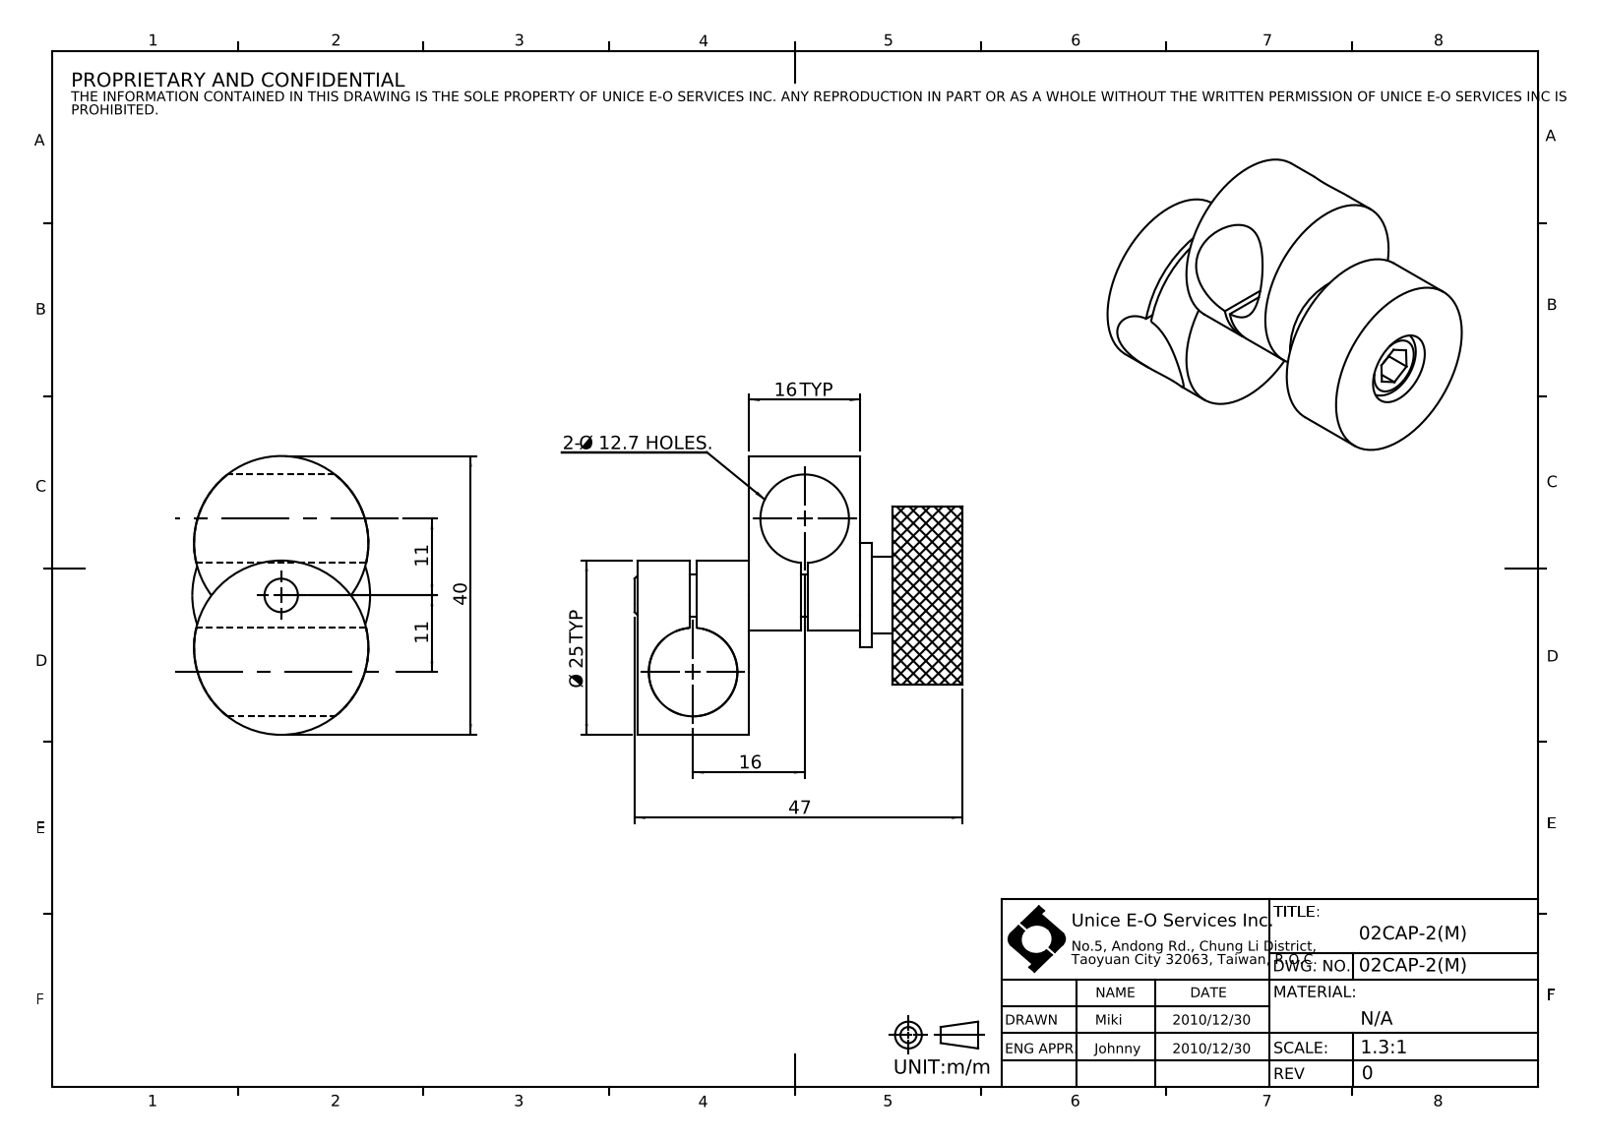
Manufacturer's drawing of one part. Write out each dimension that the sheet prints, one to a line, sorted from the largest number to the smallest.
47
40
Ø 25 TYP
16 TYP
16
11
11
